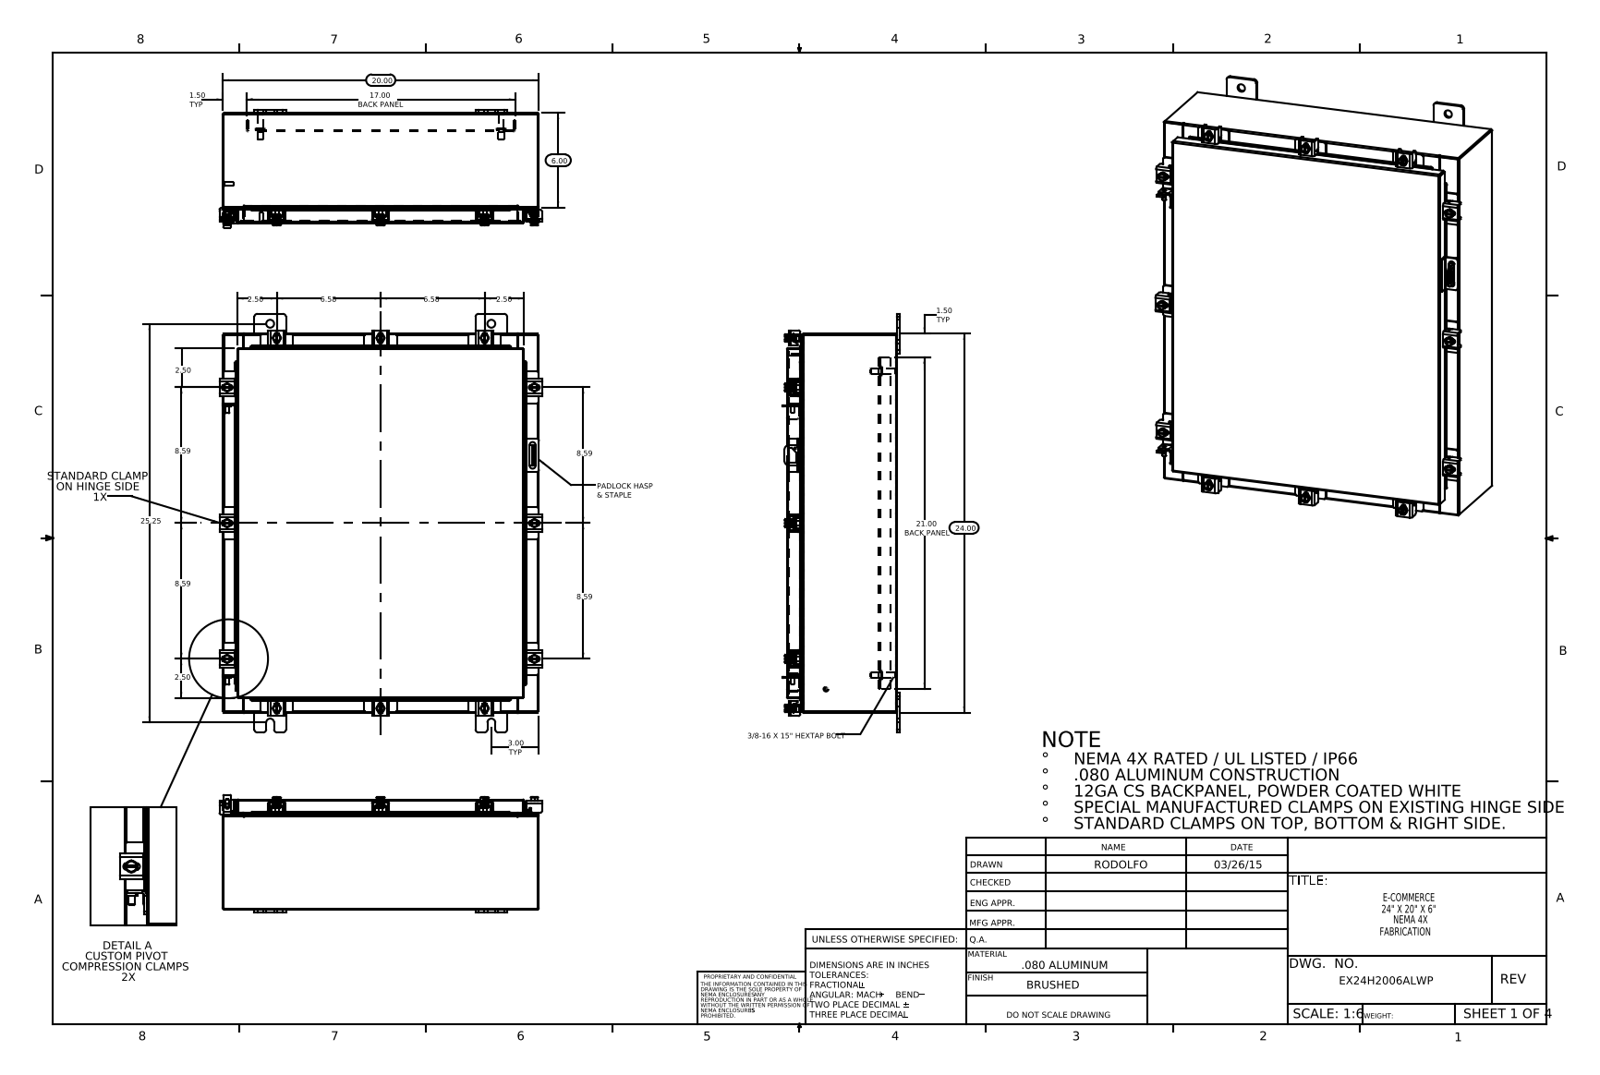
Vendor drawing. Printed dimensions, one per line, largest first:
25.25
24.00
21.00 BACK PANEL
20.00
17.00 BACK PANEL
8.59
8.59
8.59
8.59
6.58
6.58
6.00
3.00 TYP
2.50
2.50
2.50
2.50
1.50 TYP
1.50 TYP
